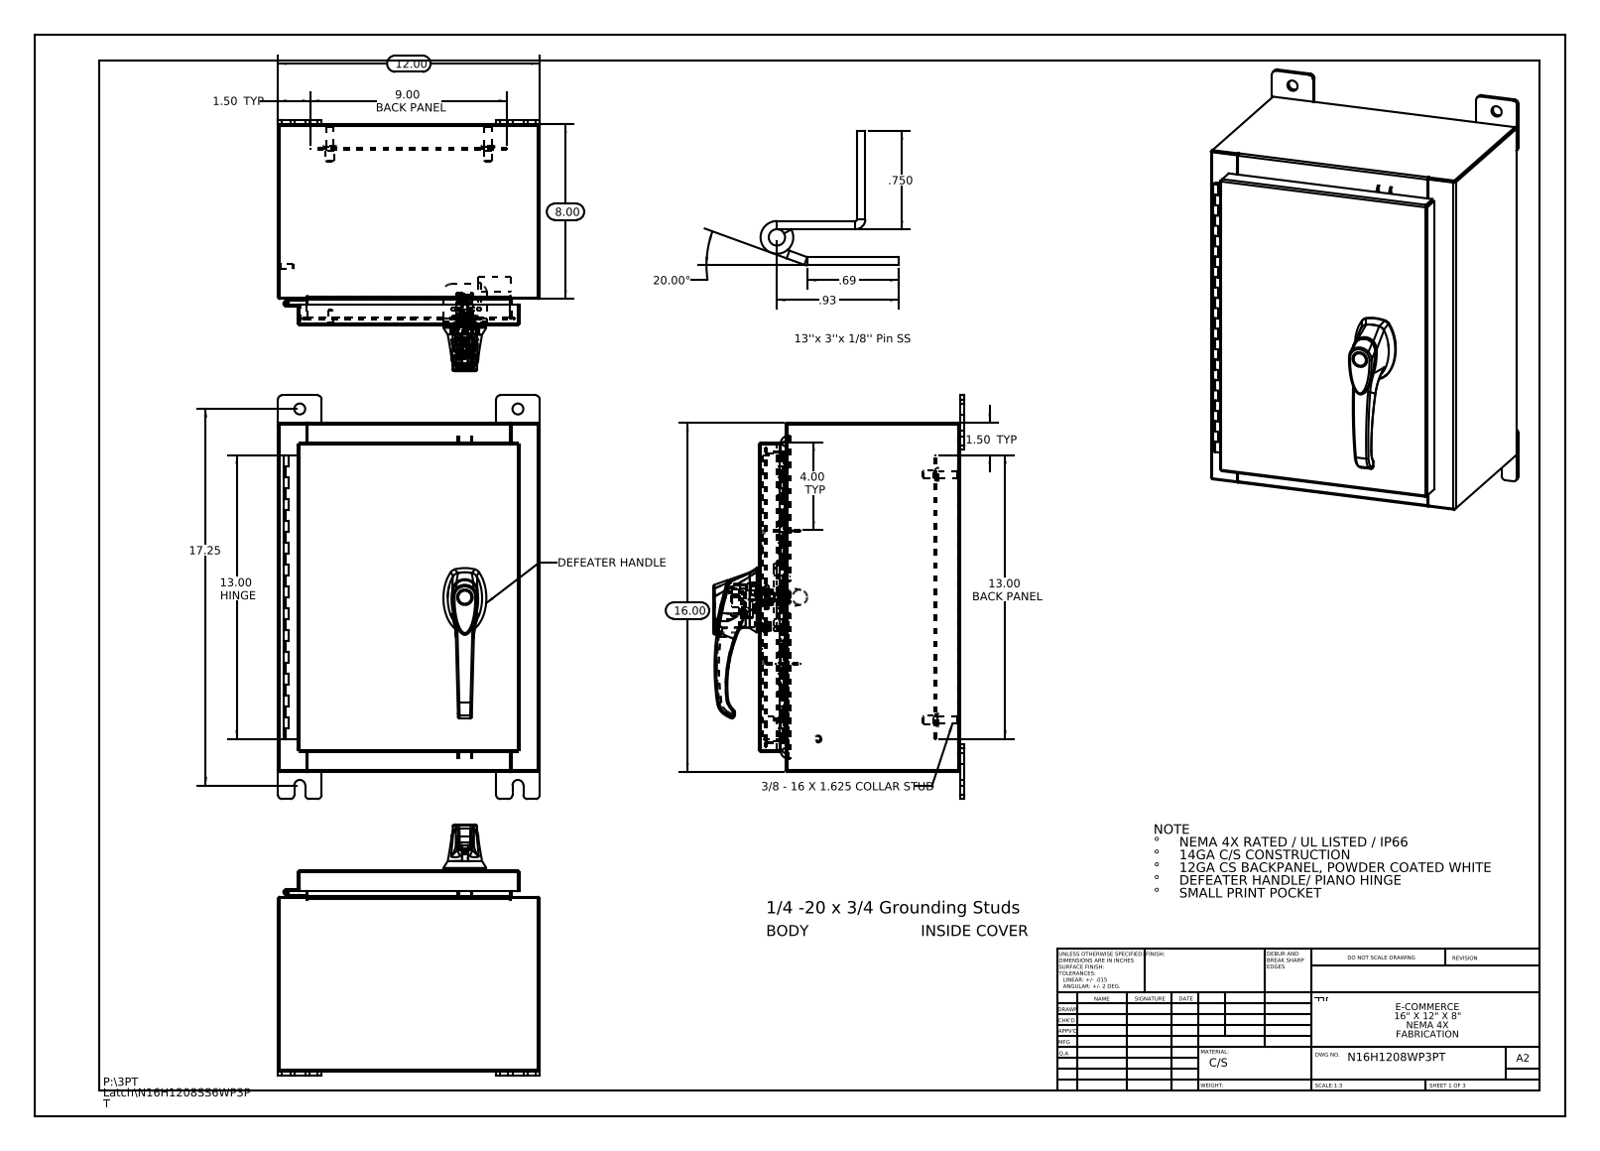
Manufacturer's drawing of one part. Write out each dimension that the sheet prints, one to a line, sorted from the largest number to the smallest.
20.00°
17.25
16.00
13.00 HINGE
13.00 BACK PANEL
12.00
9.00 BACK PANEL
8.00
4.00 TYP
1.50 TYP
1.50 TYP
.93
.750
.69
